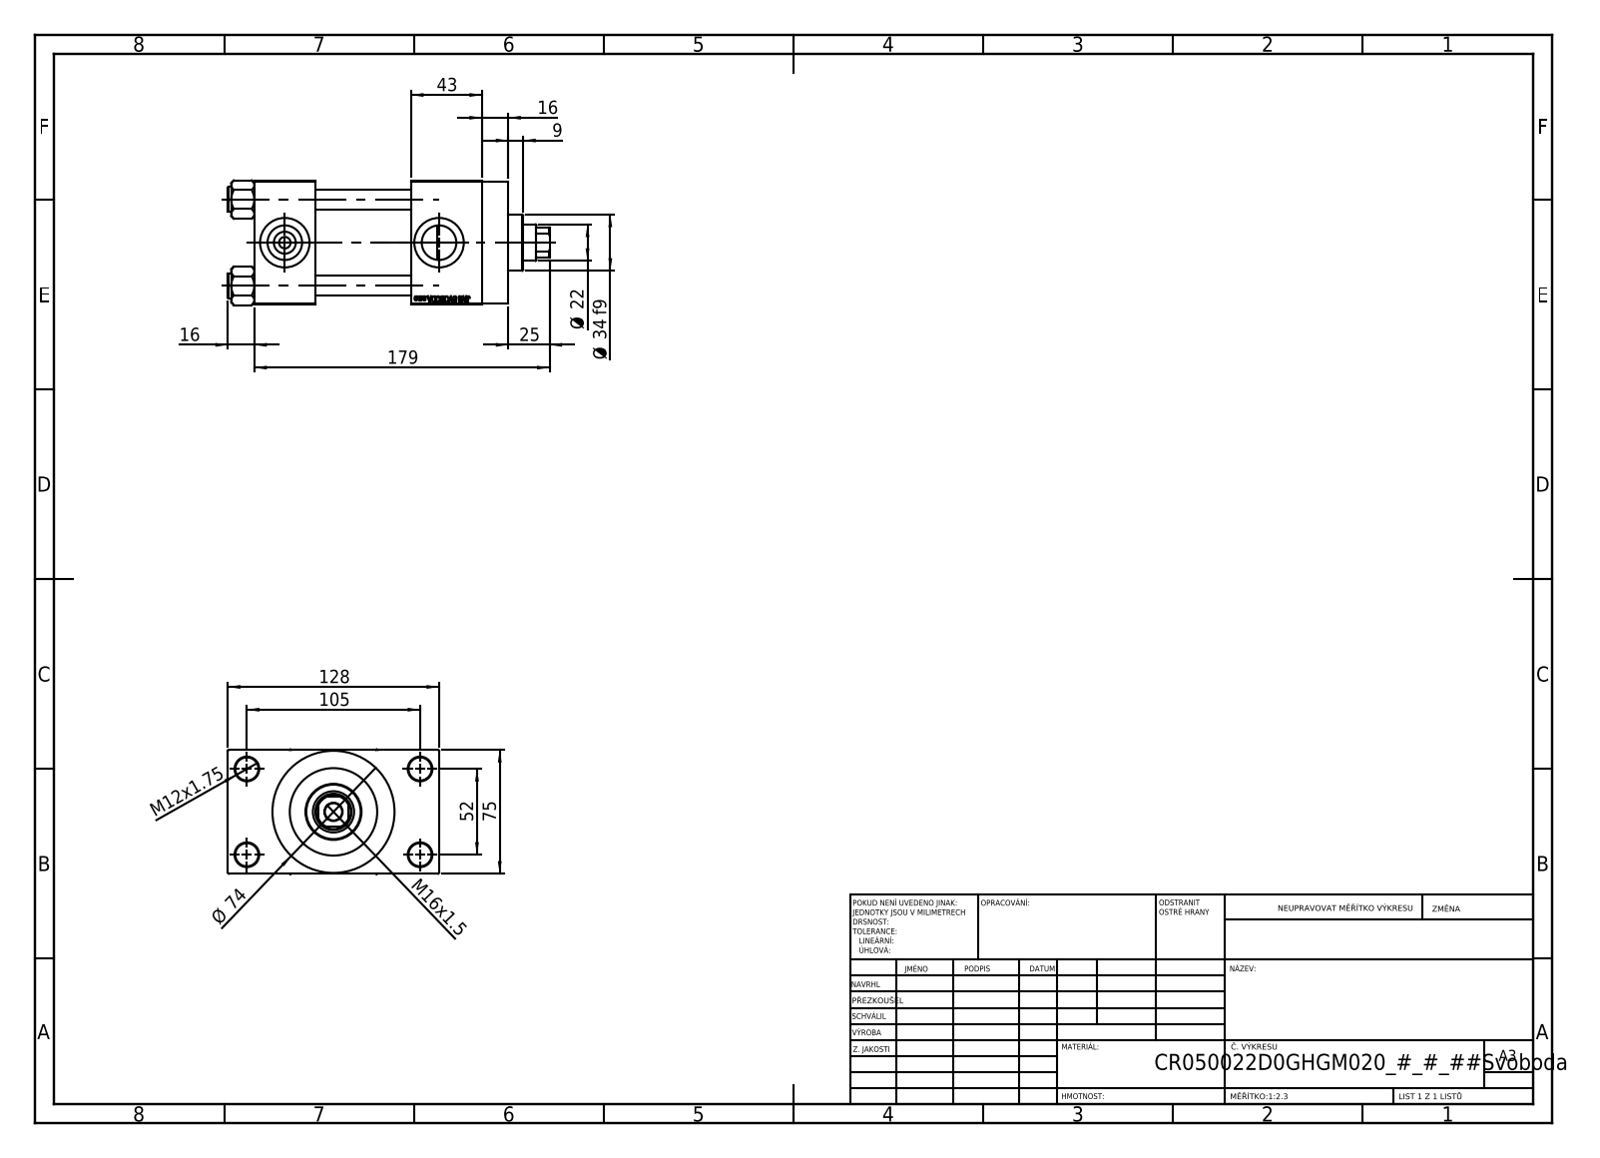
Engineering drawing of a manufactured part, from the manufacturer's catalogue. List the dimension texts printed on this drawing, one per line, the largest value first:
179
128
105
75
Ø 74
52
43
Ø 34 f9
25
Ø 22
16
16
M16x1.5
M12x1.75
9
